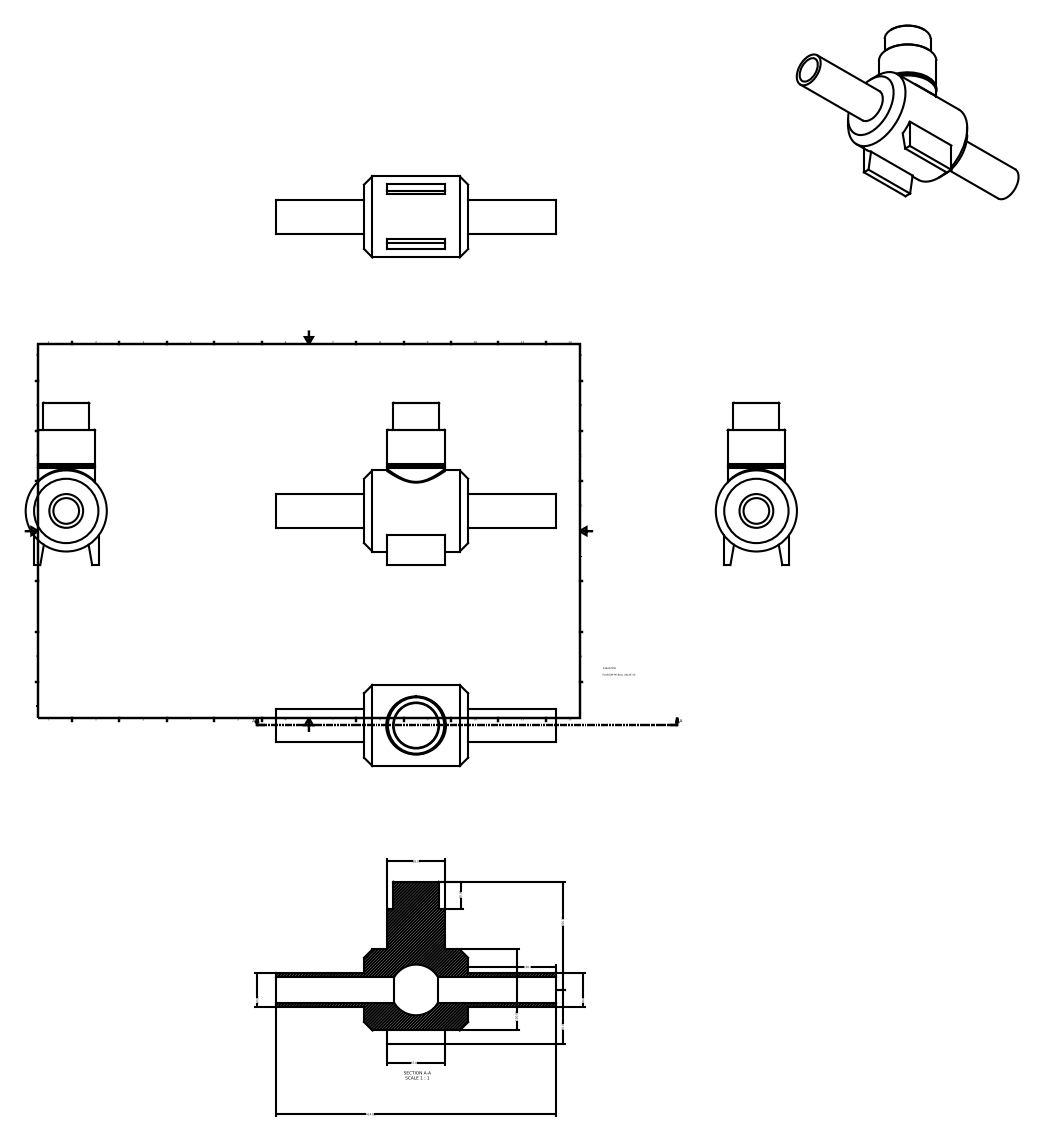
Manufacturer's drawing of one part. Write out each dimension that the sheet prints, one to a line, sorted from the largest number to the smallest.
414.00
160.00
130.00
120.00
87.00
85.00
80.00
50.00
50.00
40.00
